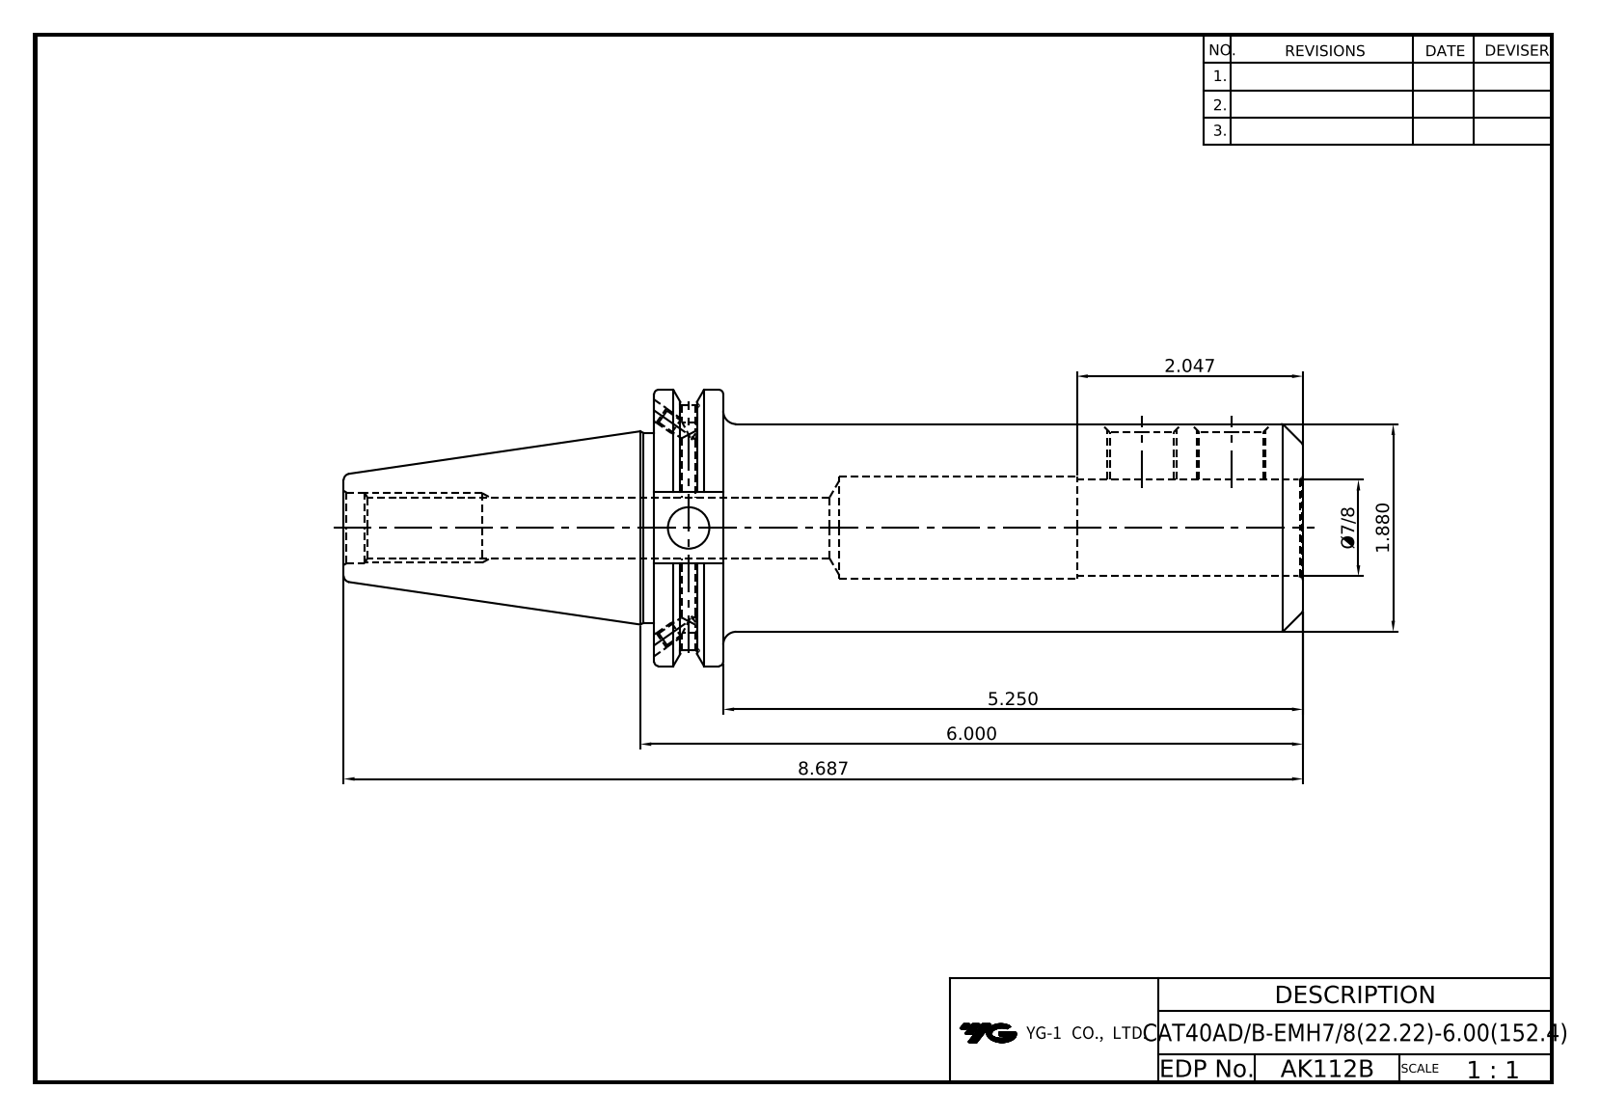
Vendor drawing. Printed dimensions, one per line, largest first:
8.687
6.000
5.250
2.047
1.880
Ø7/8
